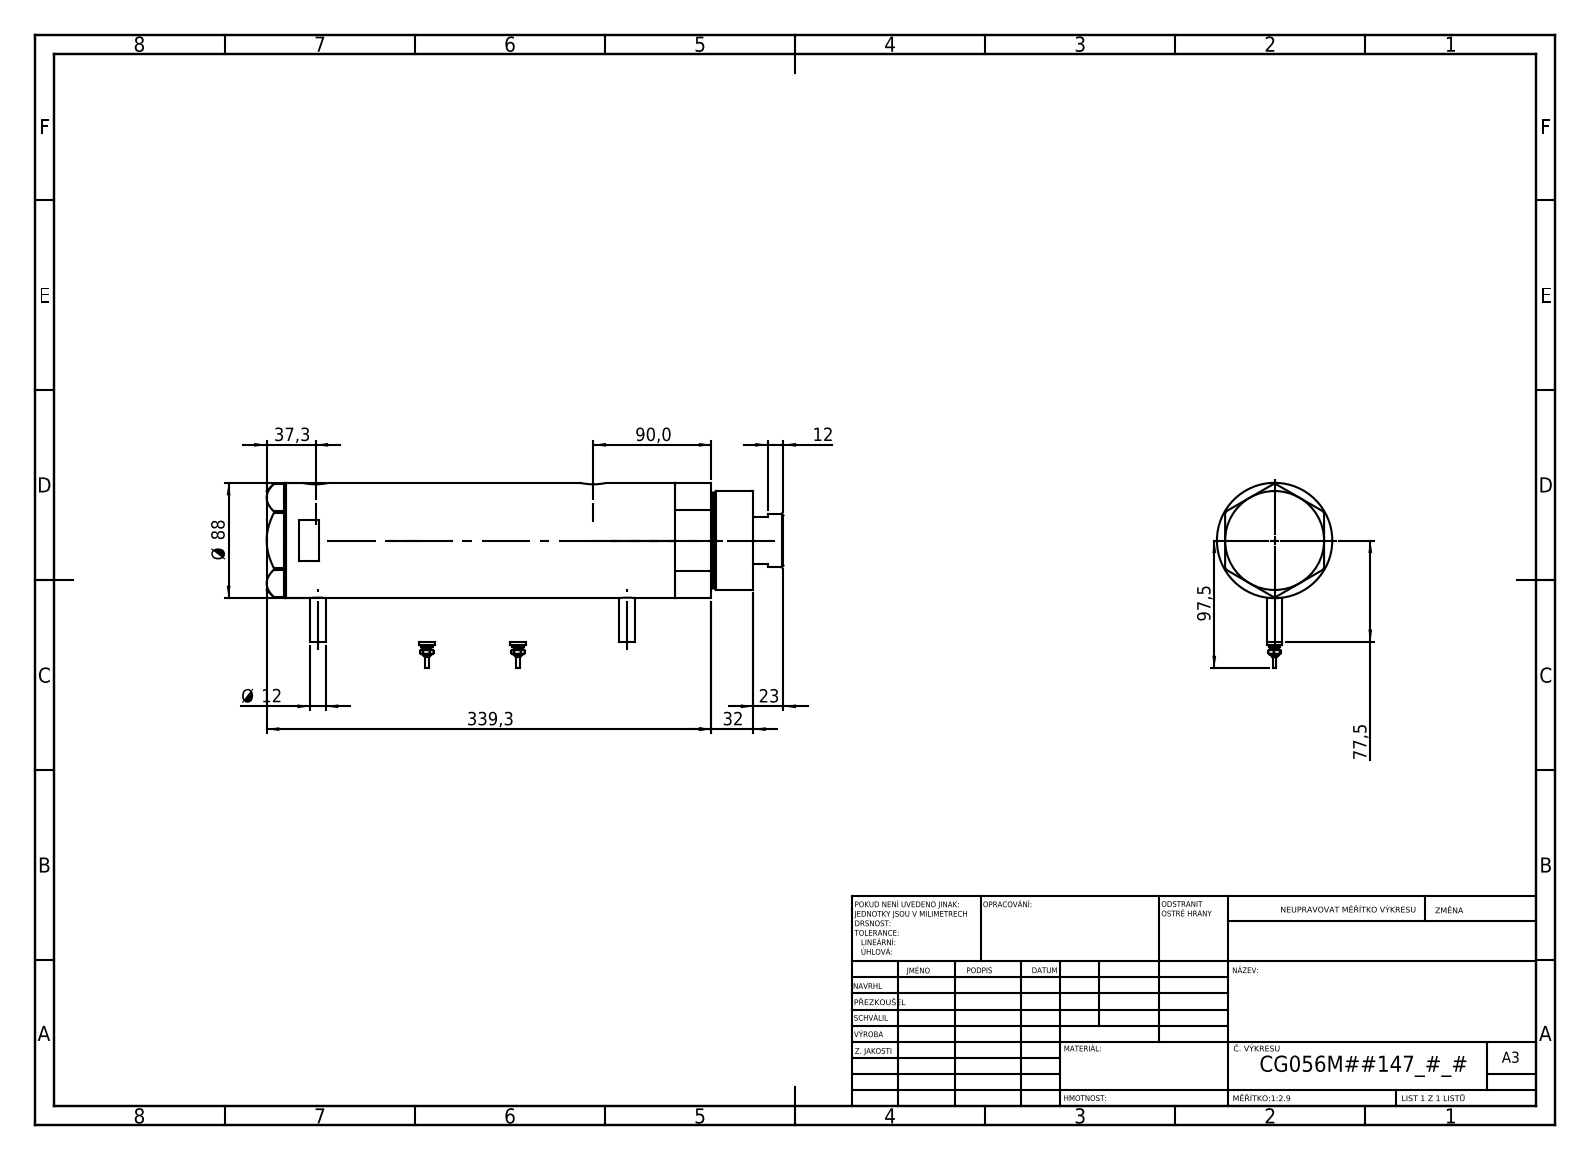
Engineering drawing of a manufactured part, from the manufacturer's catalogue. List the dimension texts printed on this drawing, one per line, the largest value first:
339,3
97,5
90,0
Ø 88
77,5
37,3
32
23
12
Ø 12
